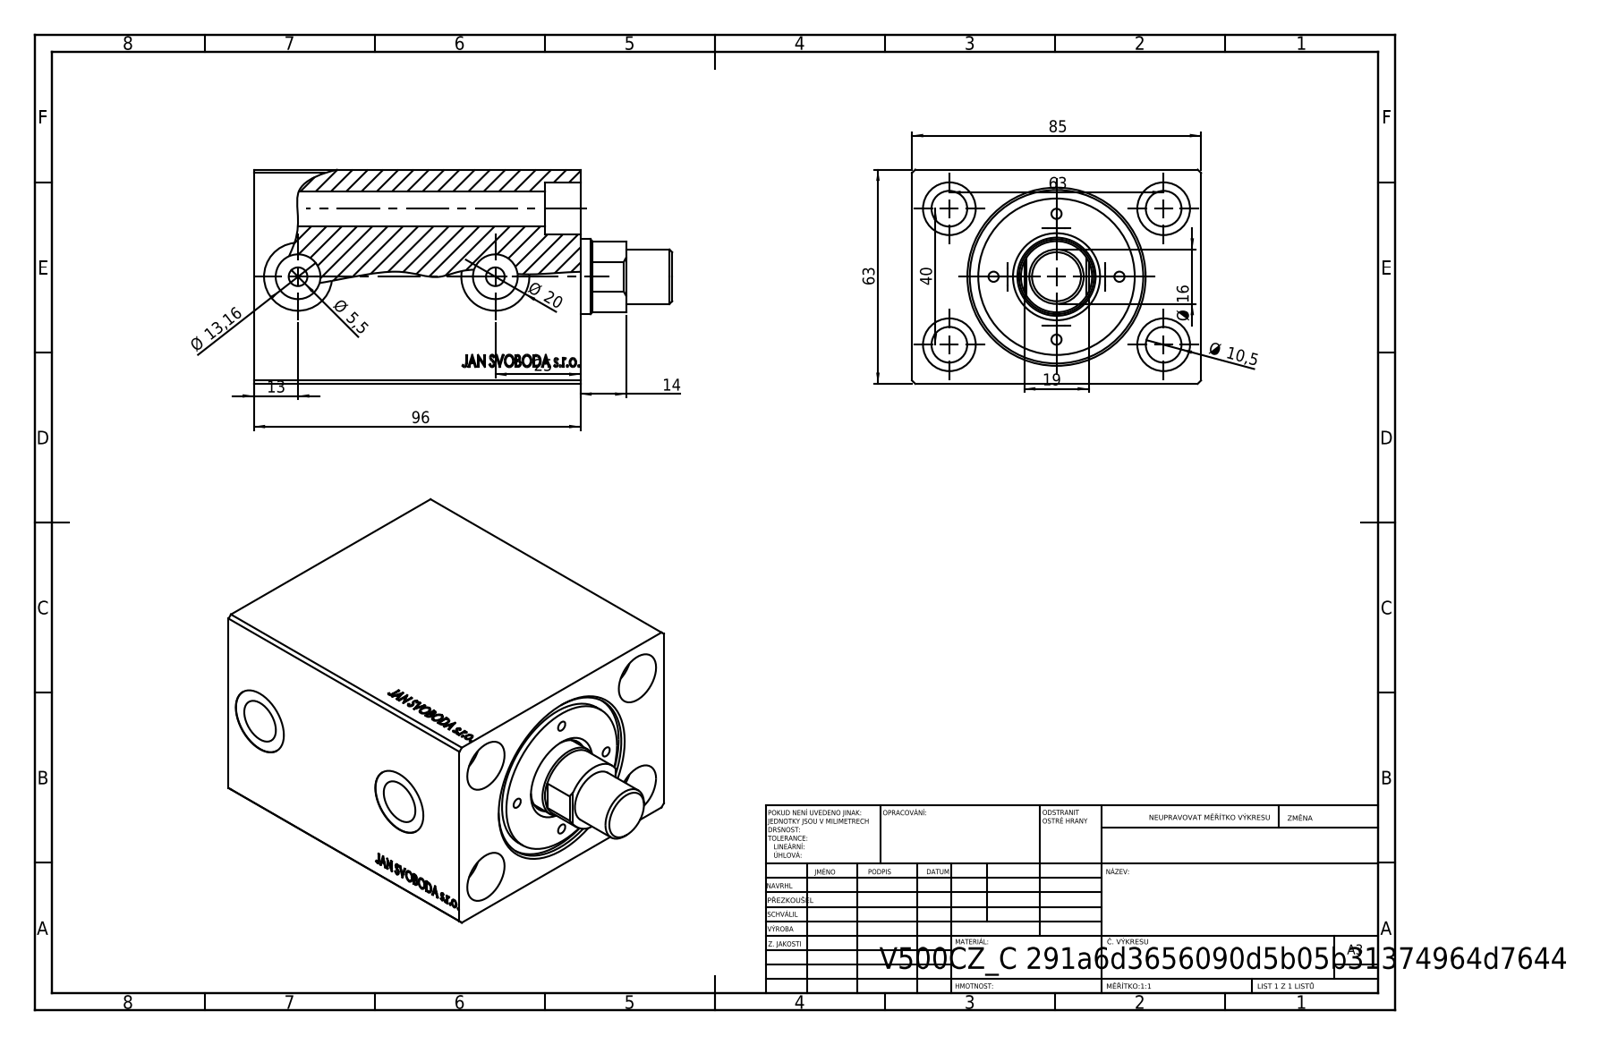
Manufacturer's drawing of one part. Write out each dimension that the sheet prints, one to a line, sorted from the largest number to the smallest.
96
85
63
63
40
25
Ø 20
19
Ø 16
14
Ø 13,16
13
Ø 10,5
Ø 5,5
